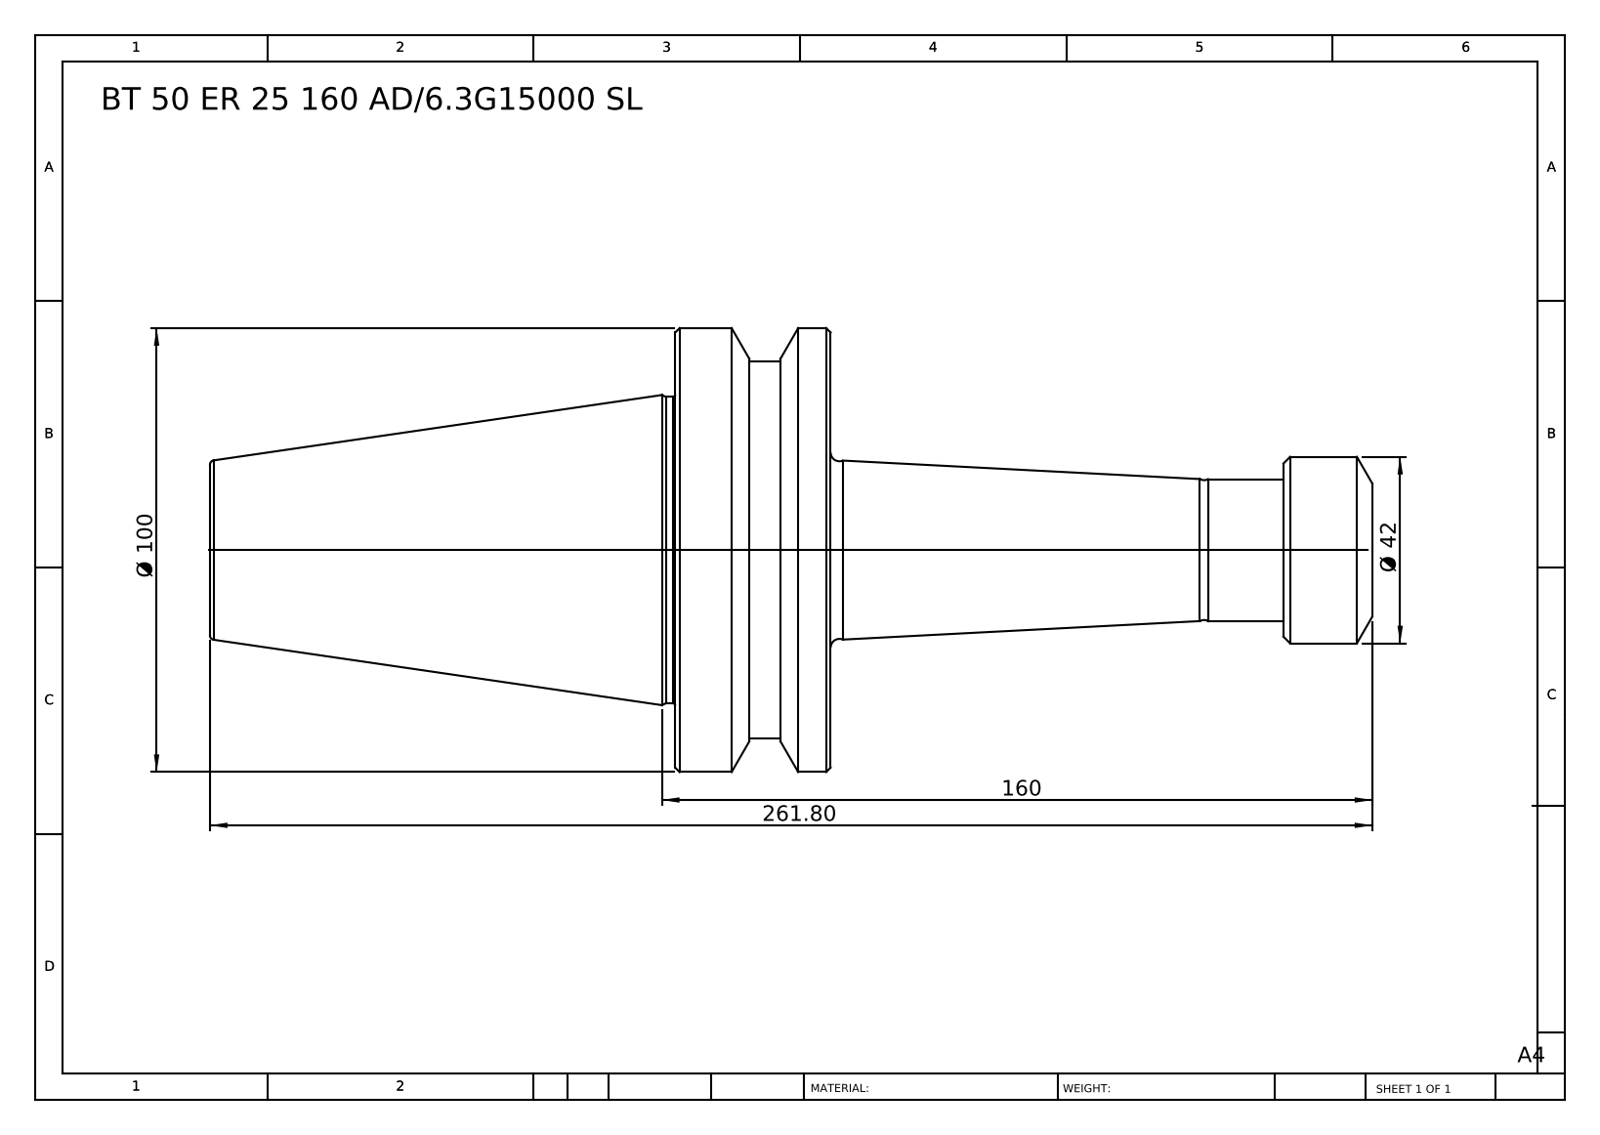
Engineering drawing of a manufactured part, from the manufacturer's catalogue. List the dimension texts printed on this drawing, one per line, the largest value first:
261.80
160
Ø 100
Ø 42
